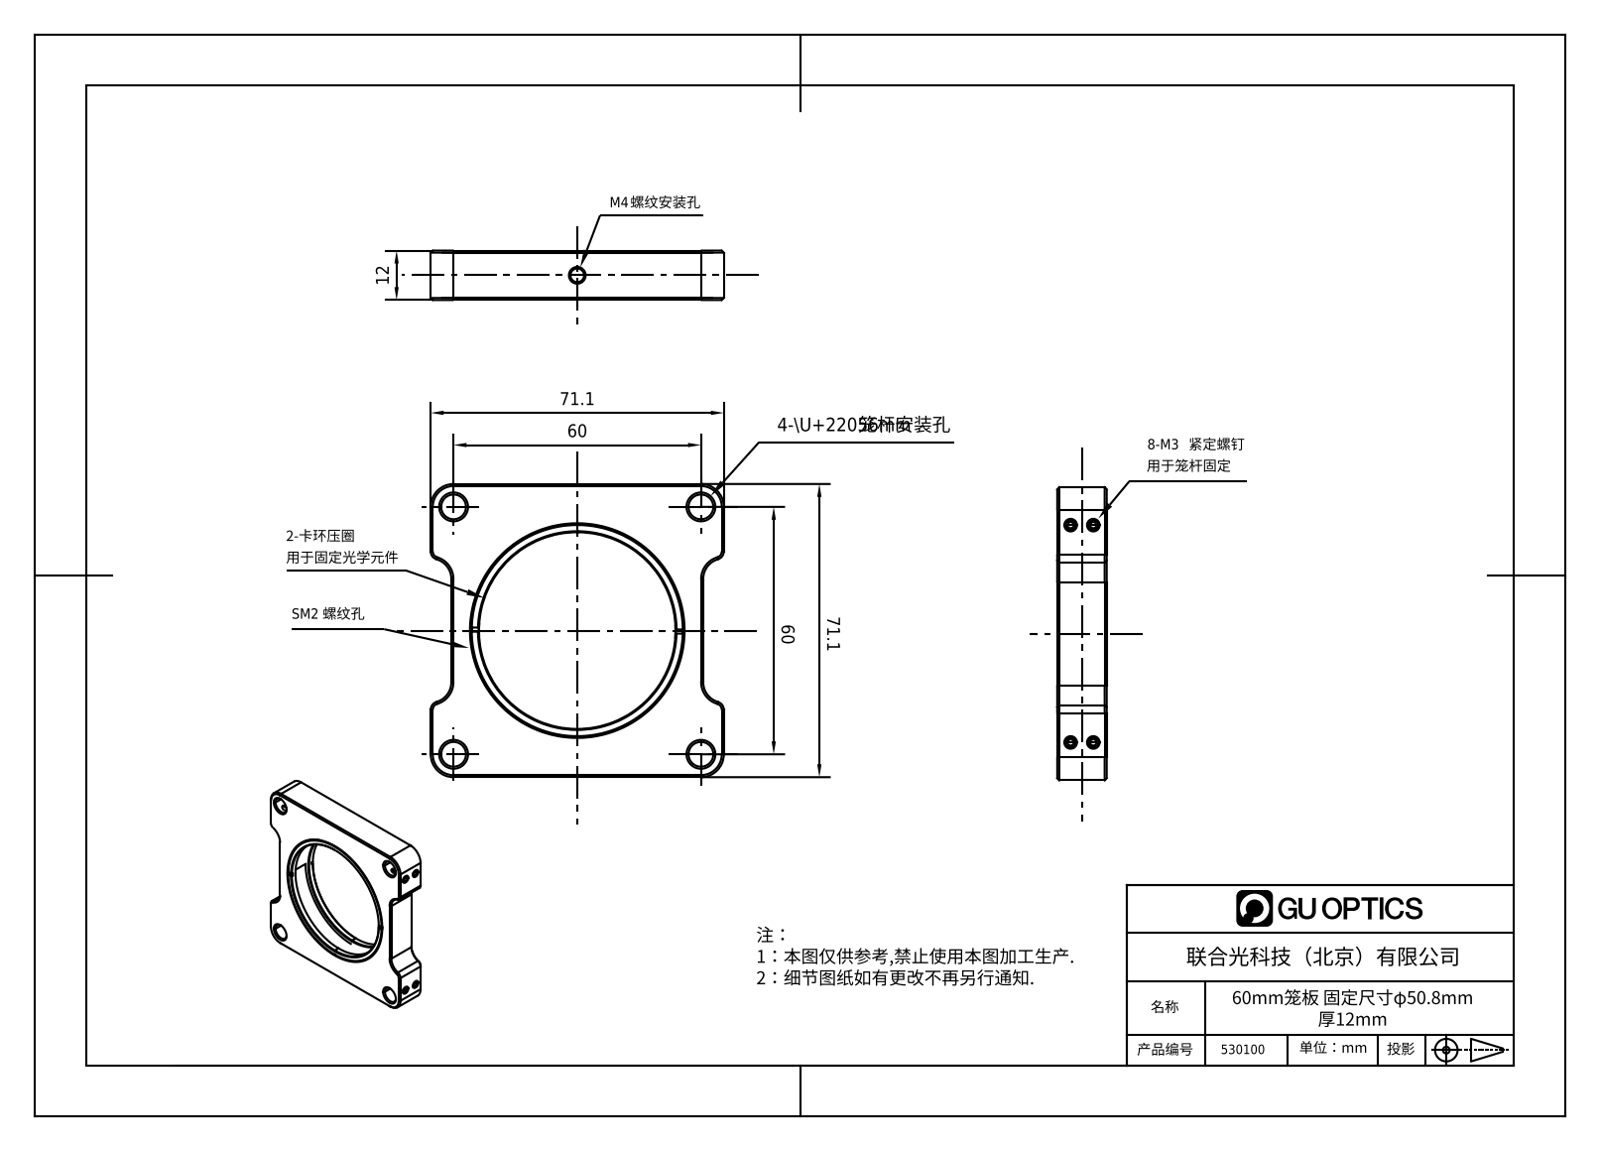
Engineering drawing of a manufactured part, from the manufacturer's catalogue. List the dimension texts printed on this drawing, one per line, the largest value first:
71.1
71.1
60
60
12
